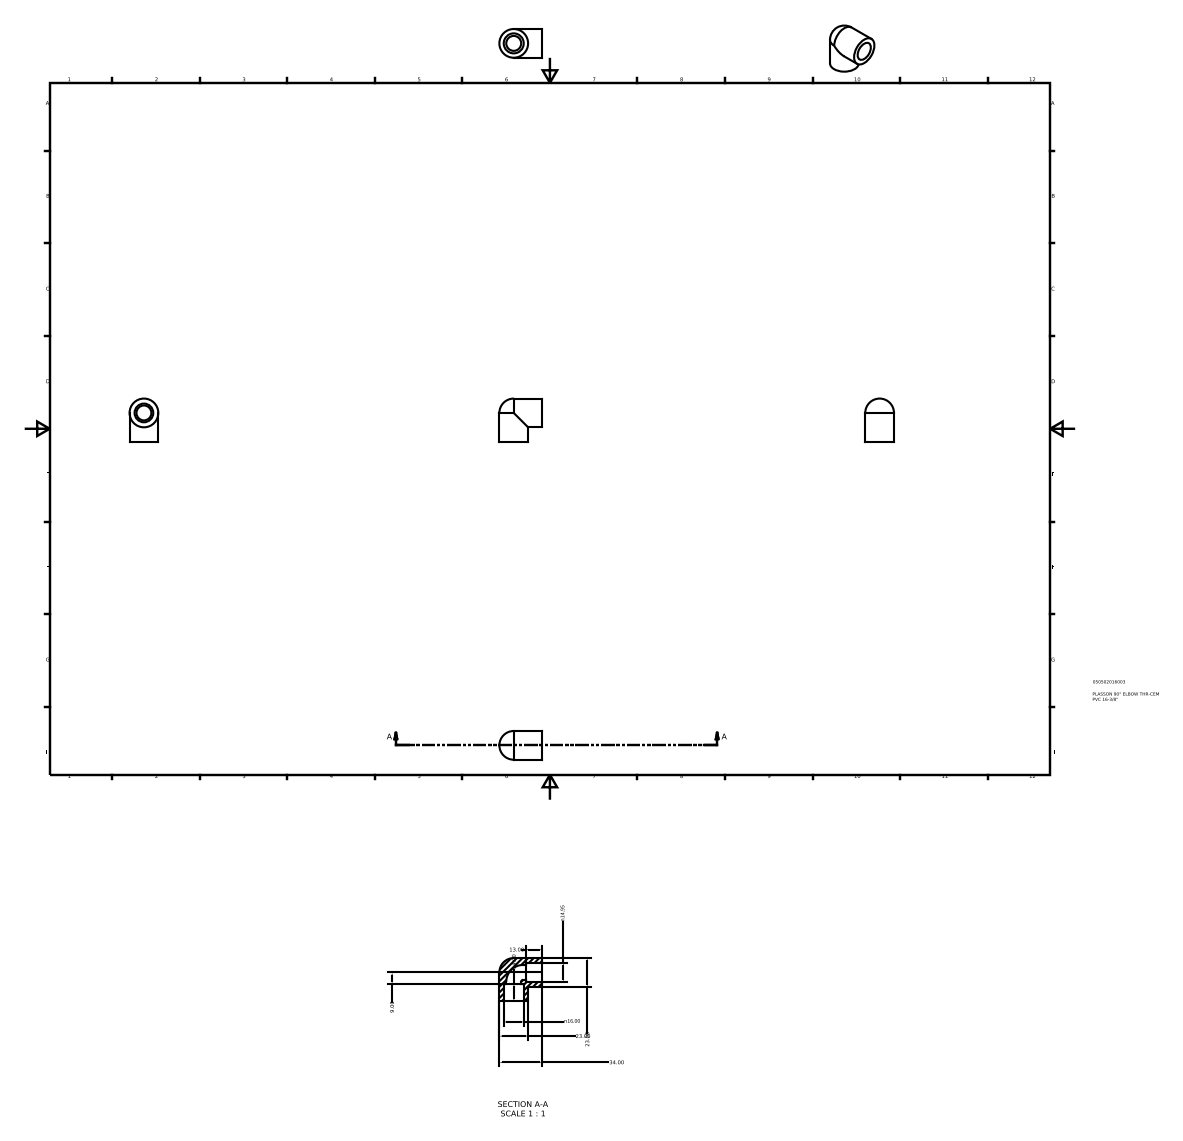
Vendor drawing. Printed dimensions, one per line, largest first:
34.00
23.00
23.00
n16.00
n14.95
14.00
13.00
9.00
